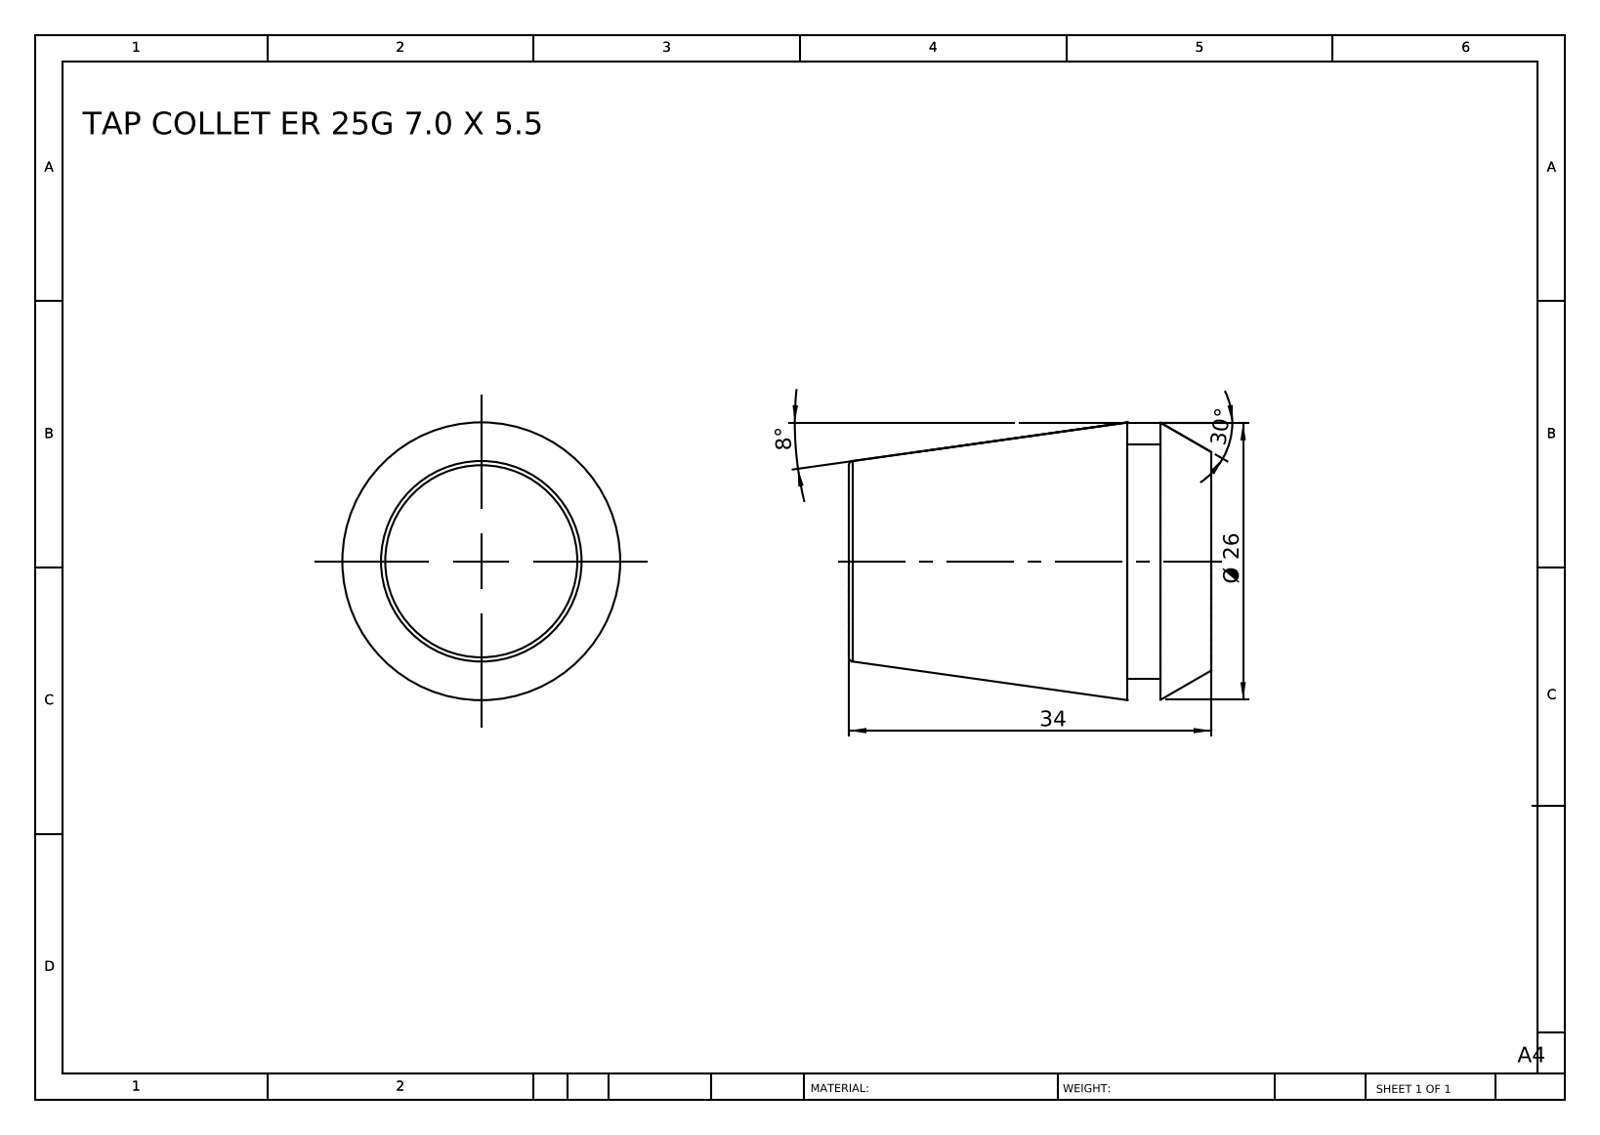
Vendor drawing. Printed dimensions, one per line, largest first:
34
30°
Ø 26
8°
